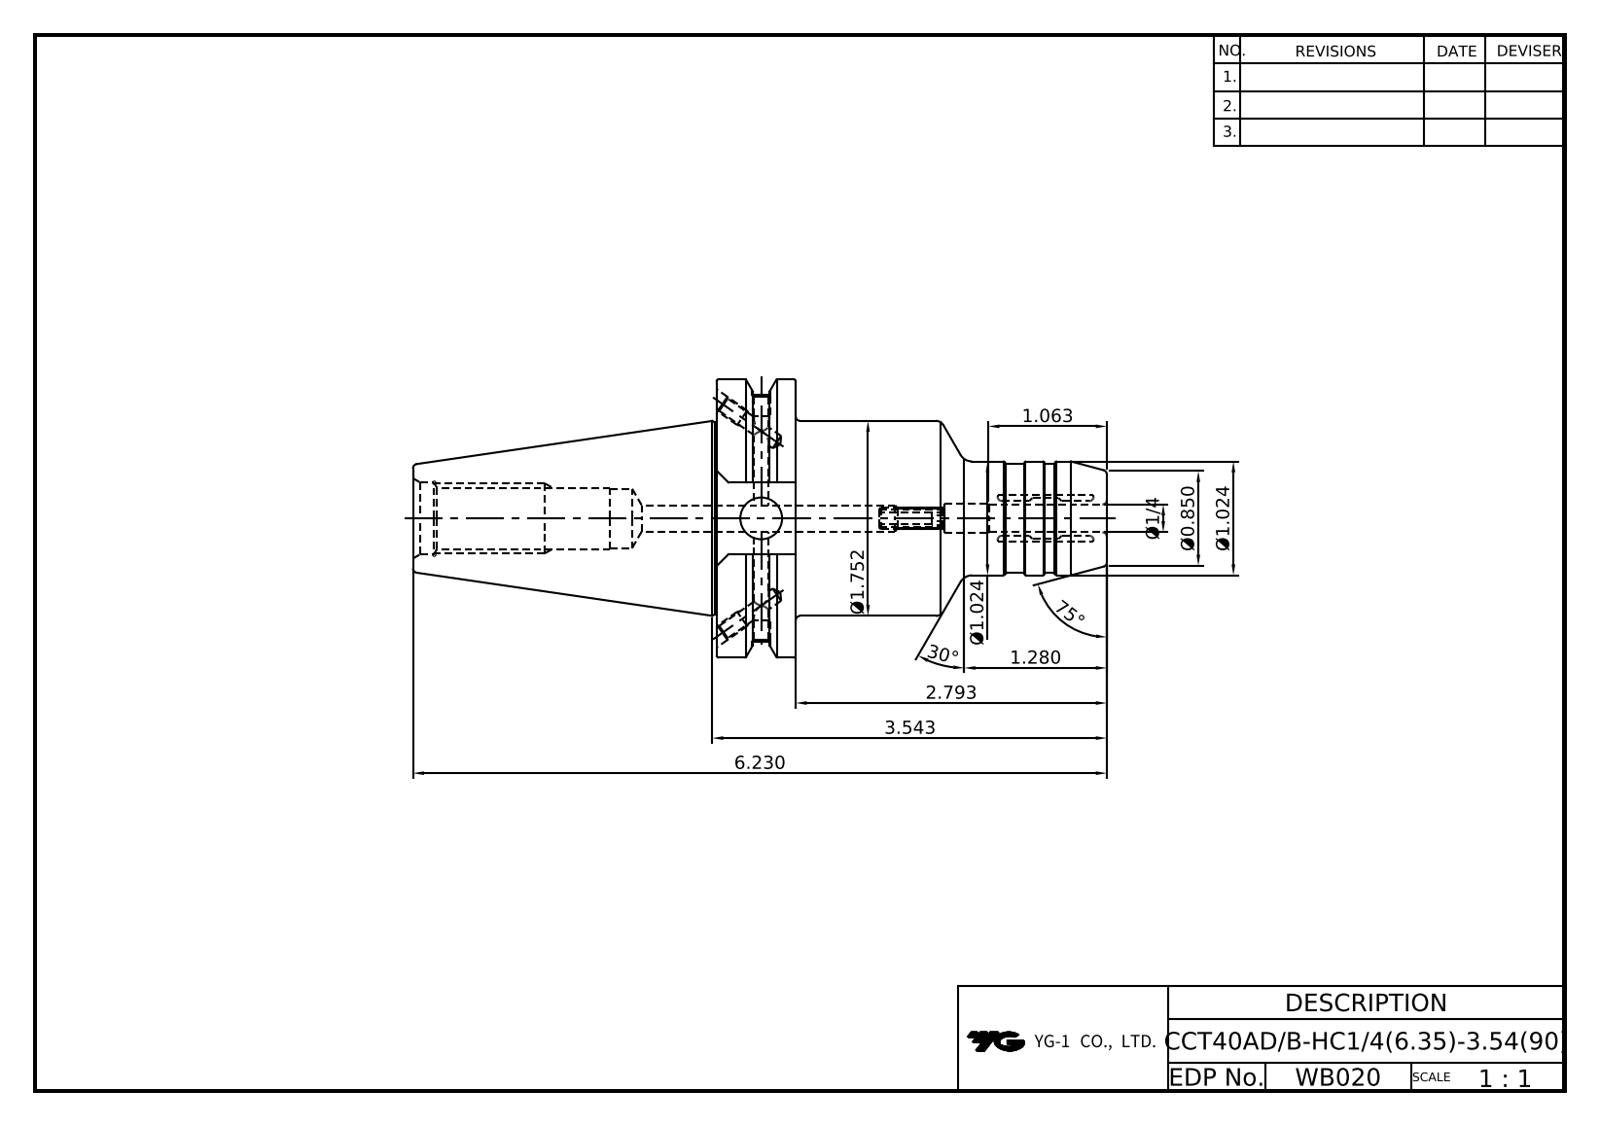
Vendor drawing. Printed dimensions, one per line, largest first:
75°
30°
6.230
3.543
2.793
Ø1.752
1.280
1.063
Ø1.024
Ø1.024
Ø0.850
Ø1/4
